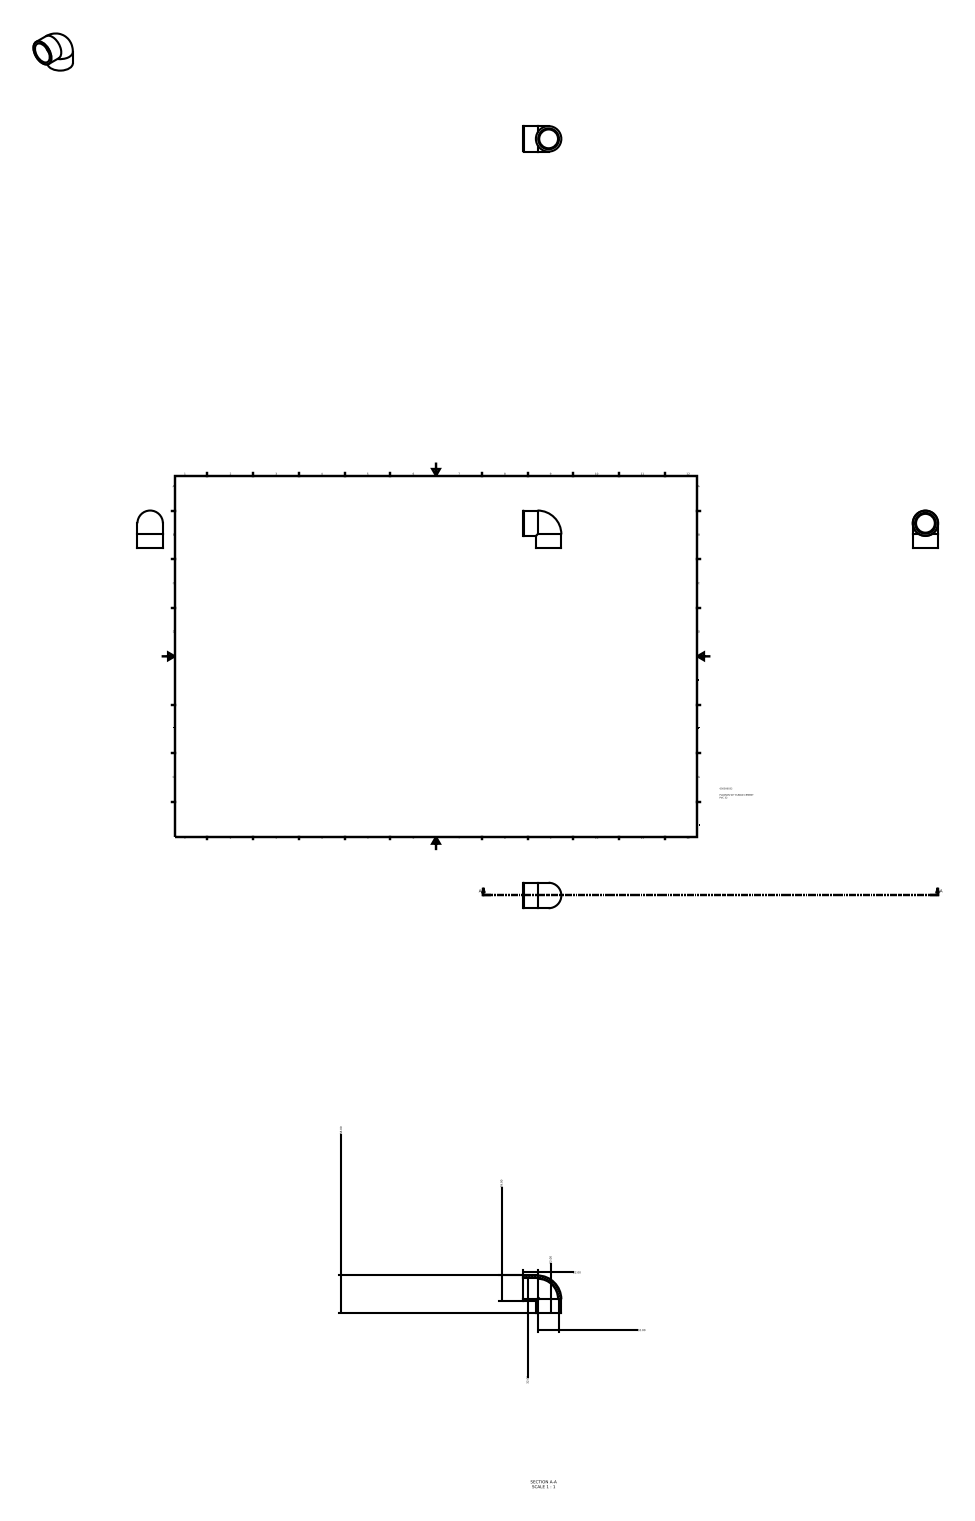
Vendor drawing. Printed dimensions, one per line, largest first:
58.00
39.00
32.00
32.00
22.00
22.00
